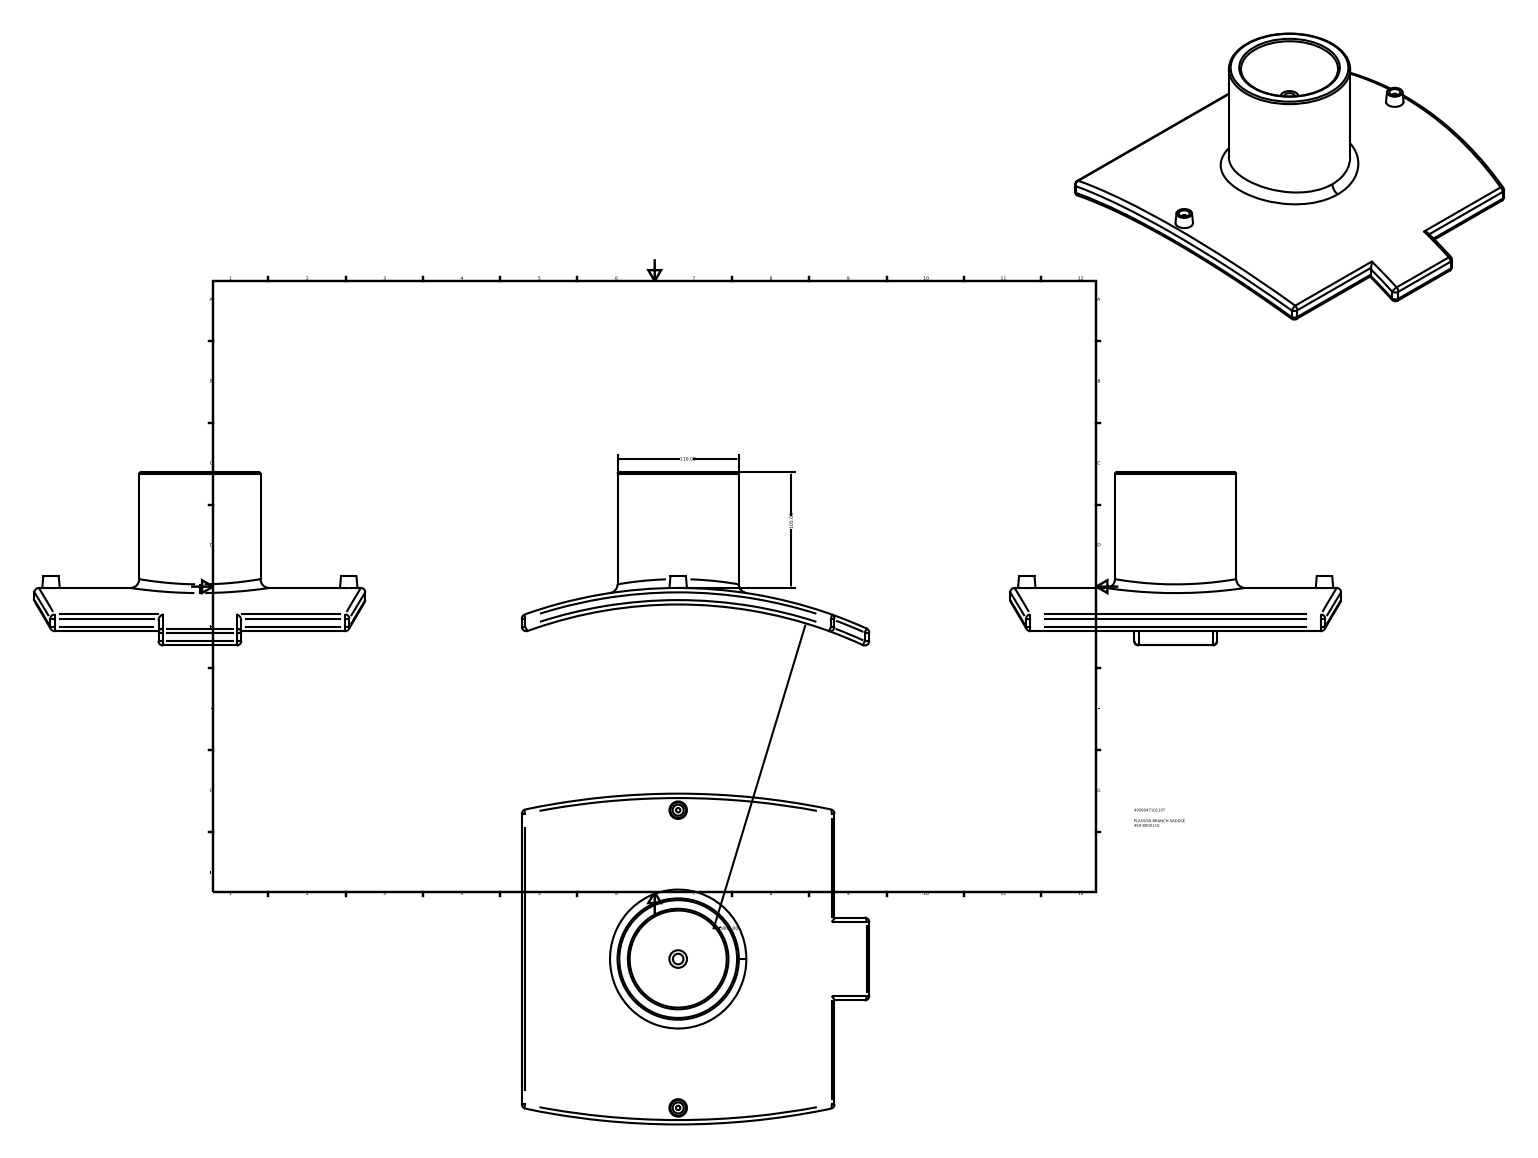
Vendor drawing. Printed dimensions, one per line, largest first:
∅800.00
110.00
105.00
